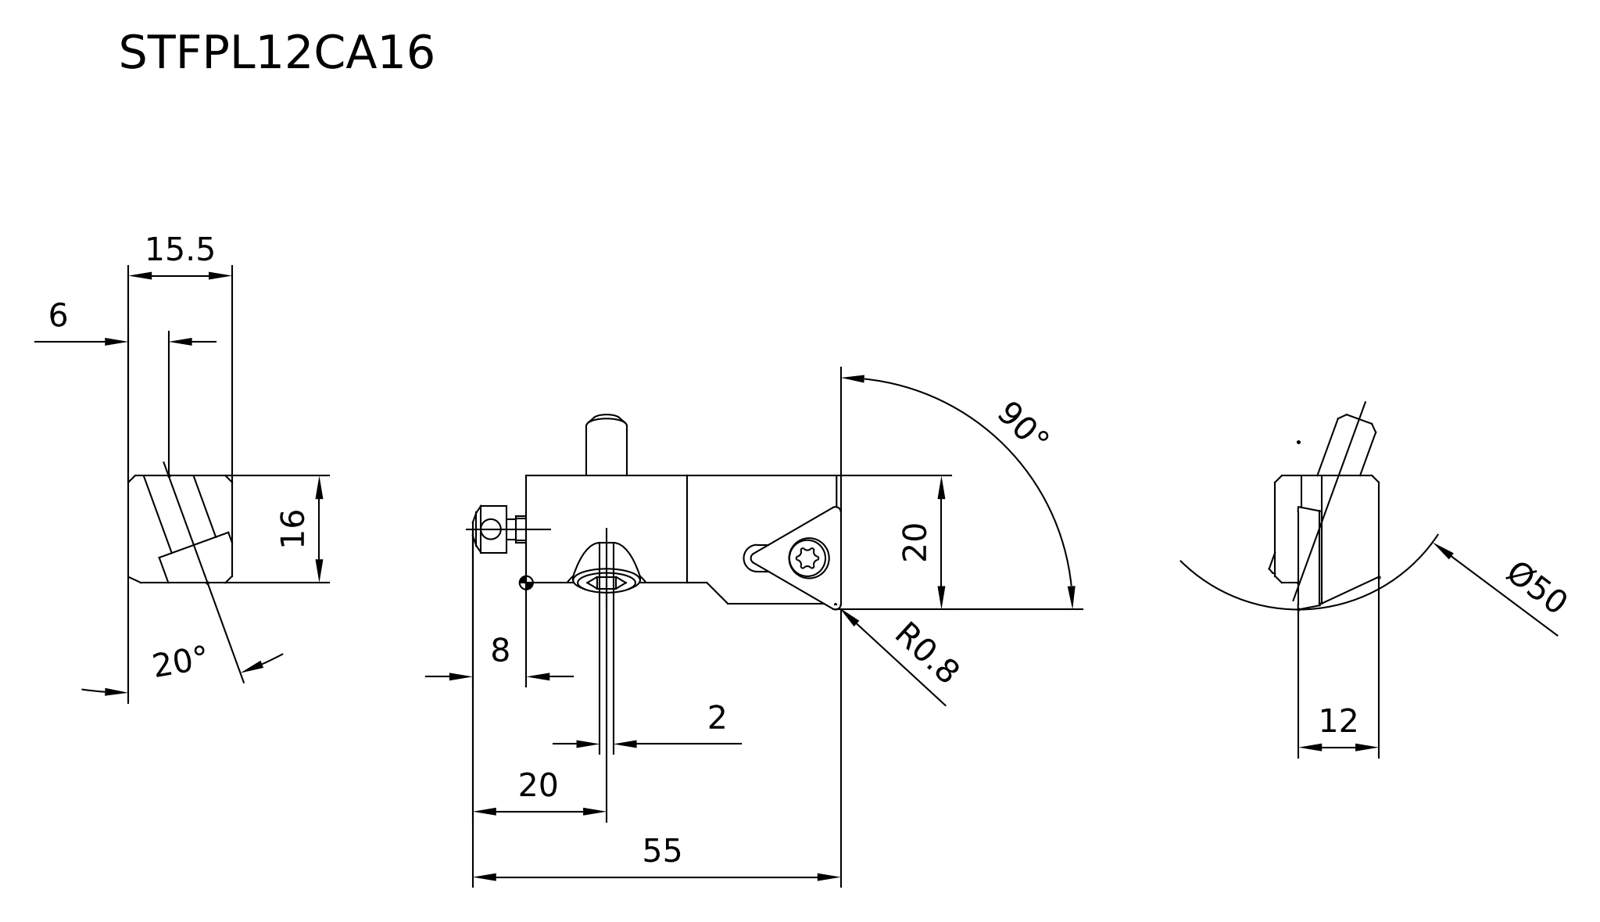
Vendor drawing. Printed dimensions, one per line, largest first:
90°
55
Ø50
20°
20
20
16
15.5
12
8
6
2
R0.8
